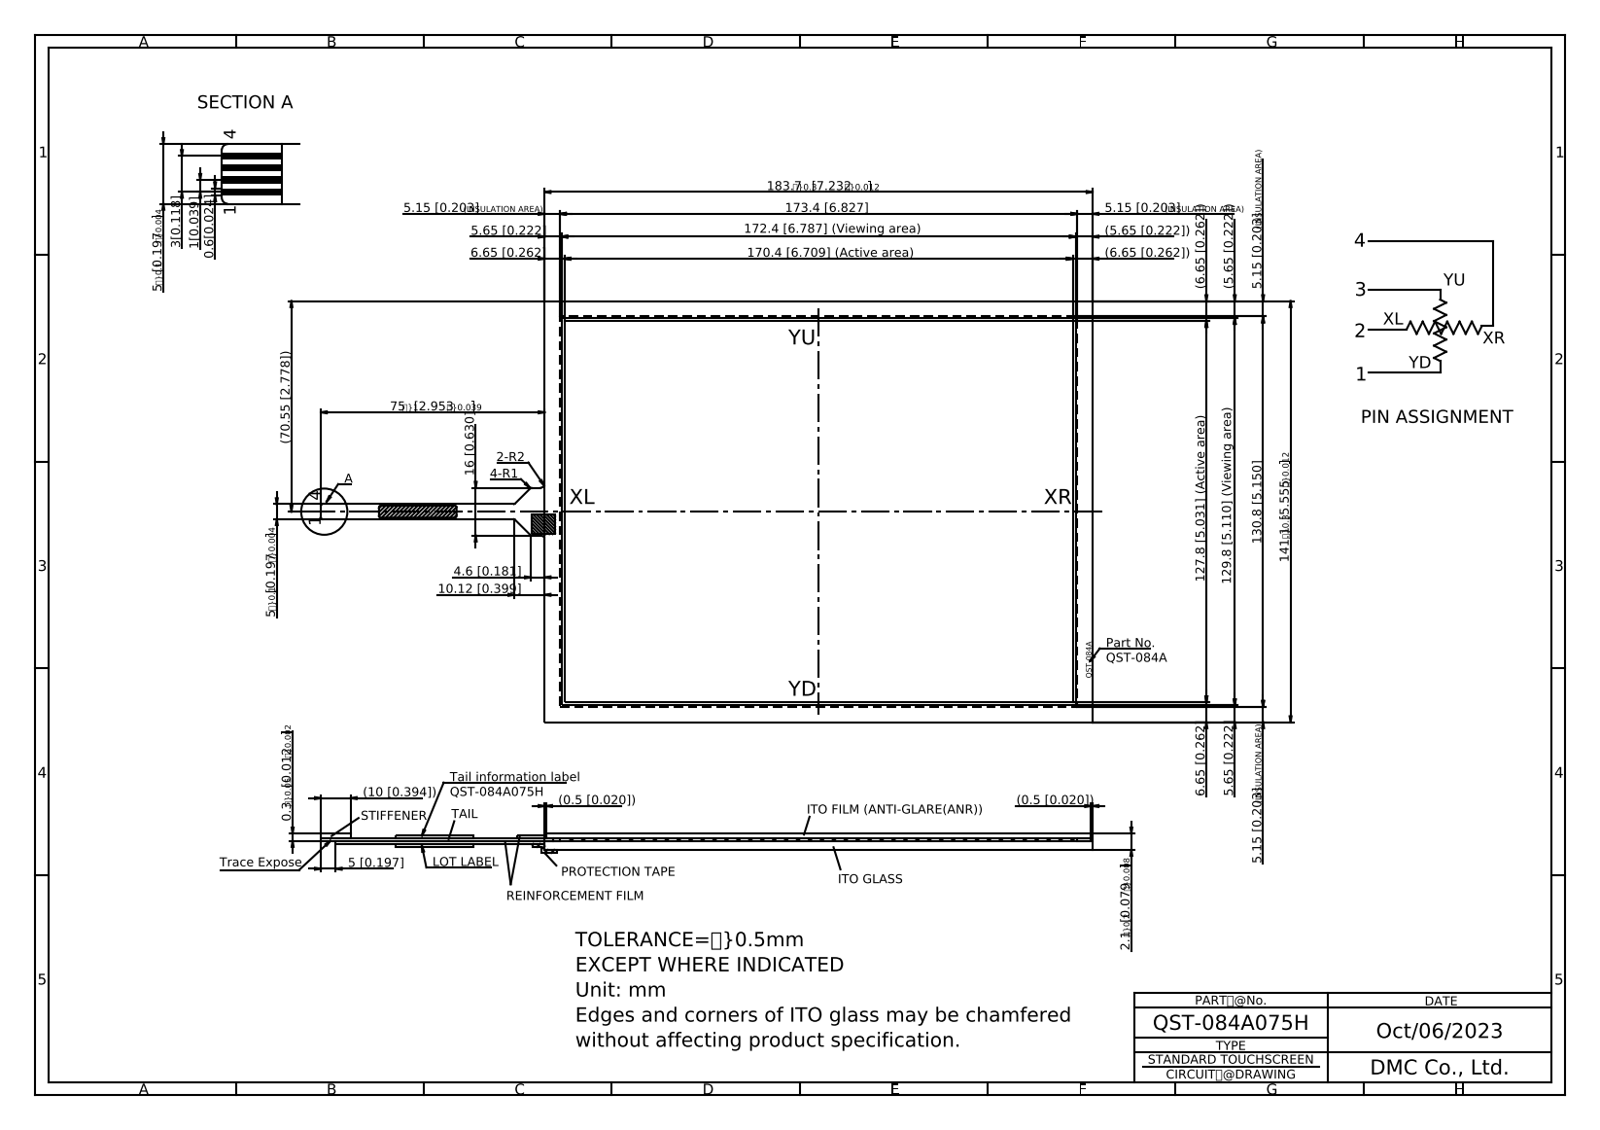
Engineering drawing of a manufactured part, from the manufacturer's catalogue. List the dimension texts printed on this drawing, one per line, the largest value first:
183.70
173.4 [6.827]
172.4 [6.787] (Viewing area)
170.4 [6.709] (Active area)
141.10
130.8 [5.150]
129.8 [5.110] (Viewing area)
127.8 [5.031] (Active area)
75.00
(70.55 [2.778])
16 [0.630]
10.12 [0.399]
(10 [0.394])
6.65 [0.262]
(6.65 [0.262])
6.65 [0.262]
(6.65 [0.262])
5.65 [0.222]
(5.65 [0.222])
5.65 [0.222]
(5.65 [0.222])
5.15{\H0.6563x;(INSULATION AREA)}
5.15{\H0.6563x;(INSULATION AREA)}
5.15{\H0.6563x;(INSULATION AREA)}
5.15{\H0.6563x;(INSULATION AREA)}
5.00
5 [0.197]
5{\H0.6667x;?}0.1}[0.197{\H0.6667x;?}0.004}]
4.6 [0.181]
3[0.118]
2.1{\H0.6667x;?}0.2}[0.079{\H0.6667x;?}0.008}]
1[0.039]
0.6[0.024]
(0.5 [0.020])
(0.5 [0.020])
0.3{\H0.6667x;?}0.05}[0.012{\H0.6667x;?}0.002}]
